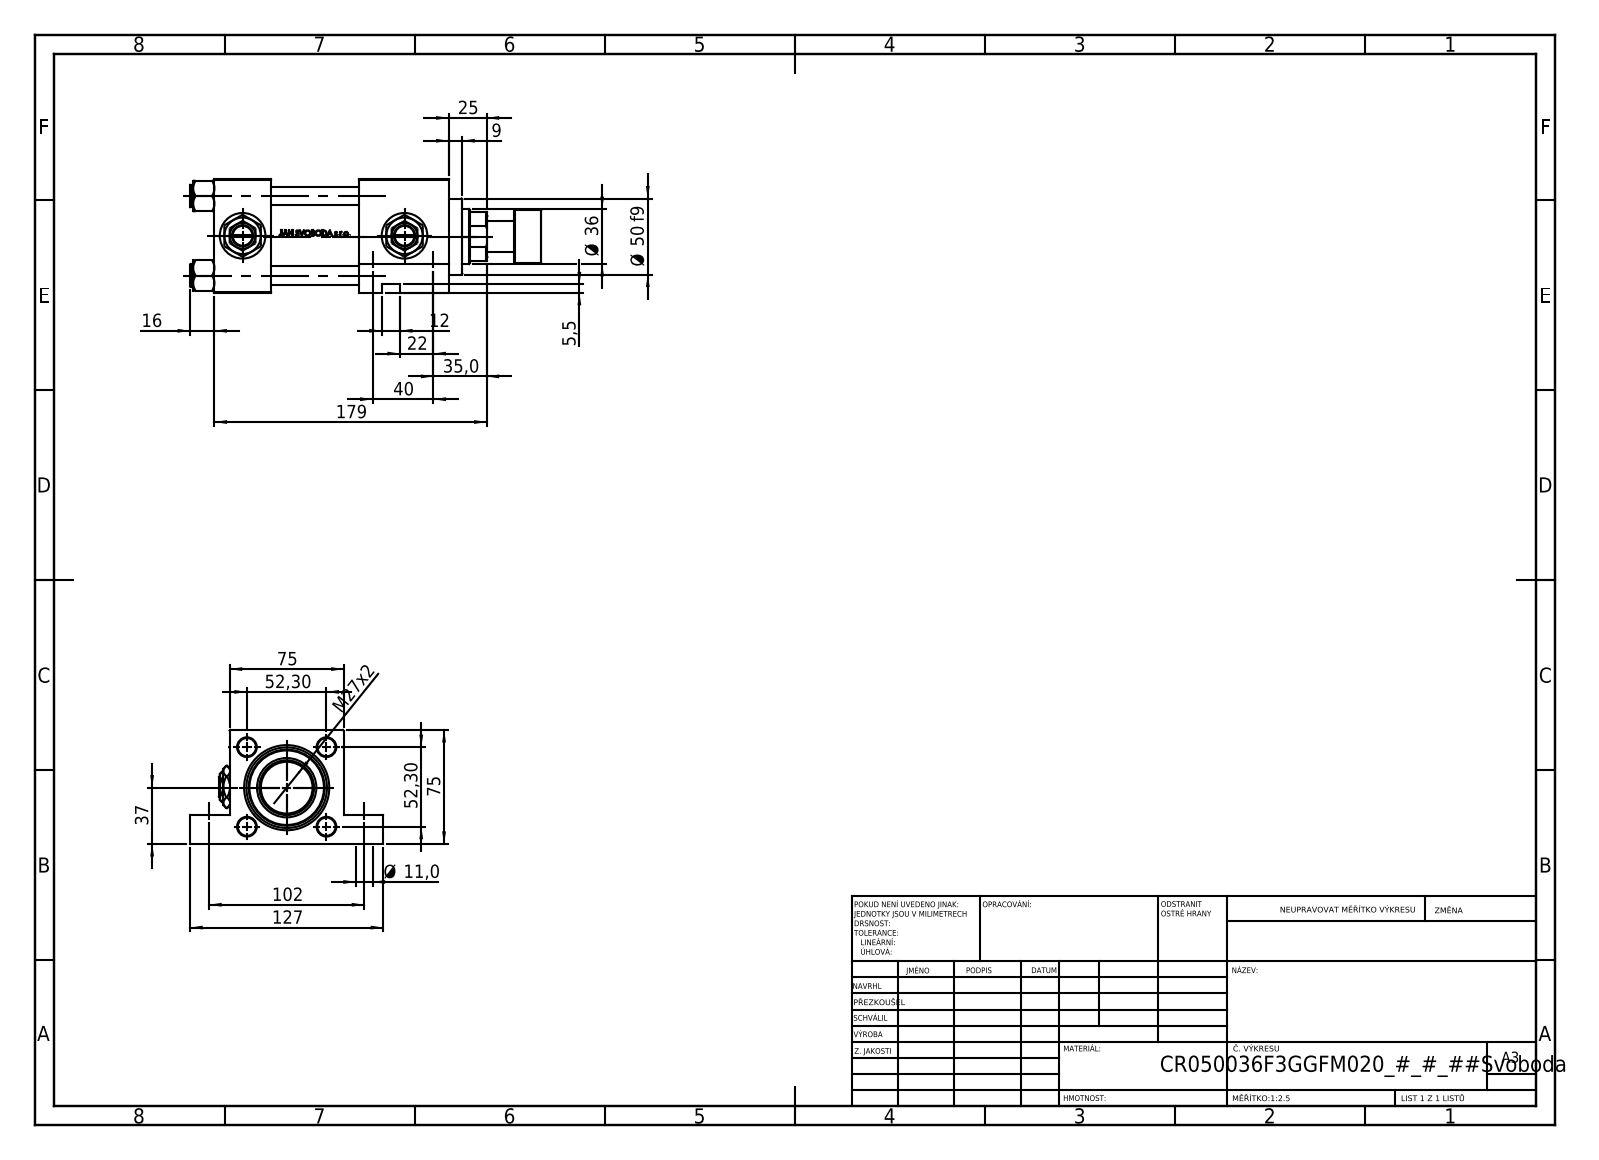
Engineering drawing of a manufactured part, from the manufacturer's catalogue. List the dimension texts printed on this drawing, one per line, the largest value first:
179
127
102
75
75
52,30
52,30
Ø 50 f9
40
37
Ø 36
35,0
M27x2
25
22
16
12
Ø 11,0
9
5,5
